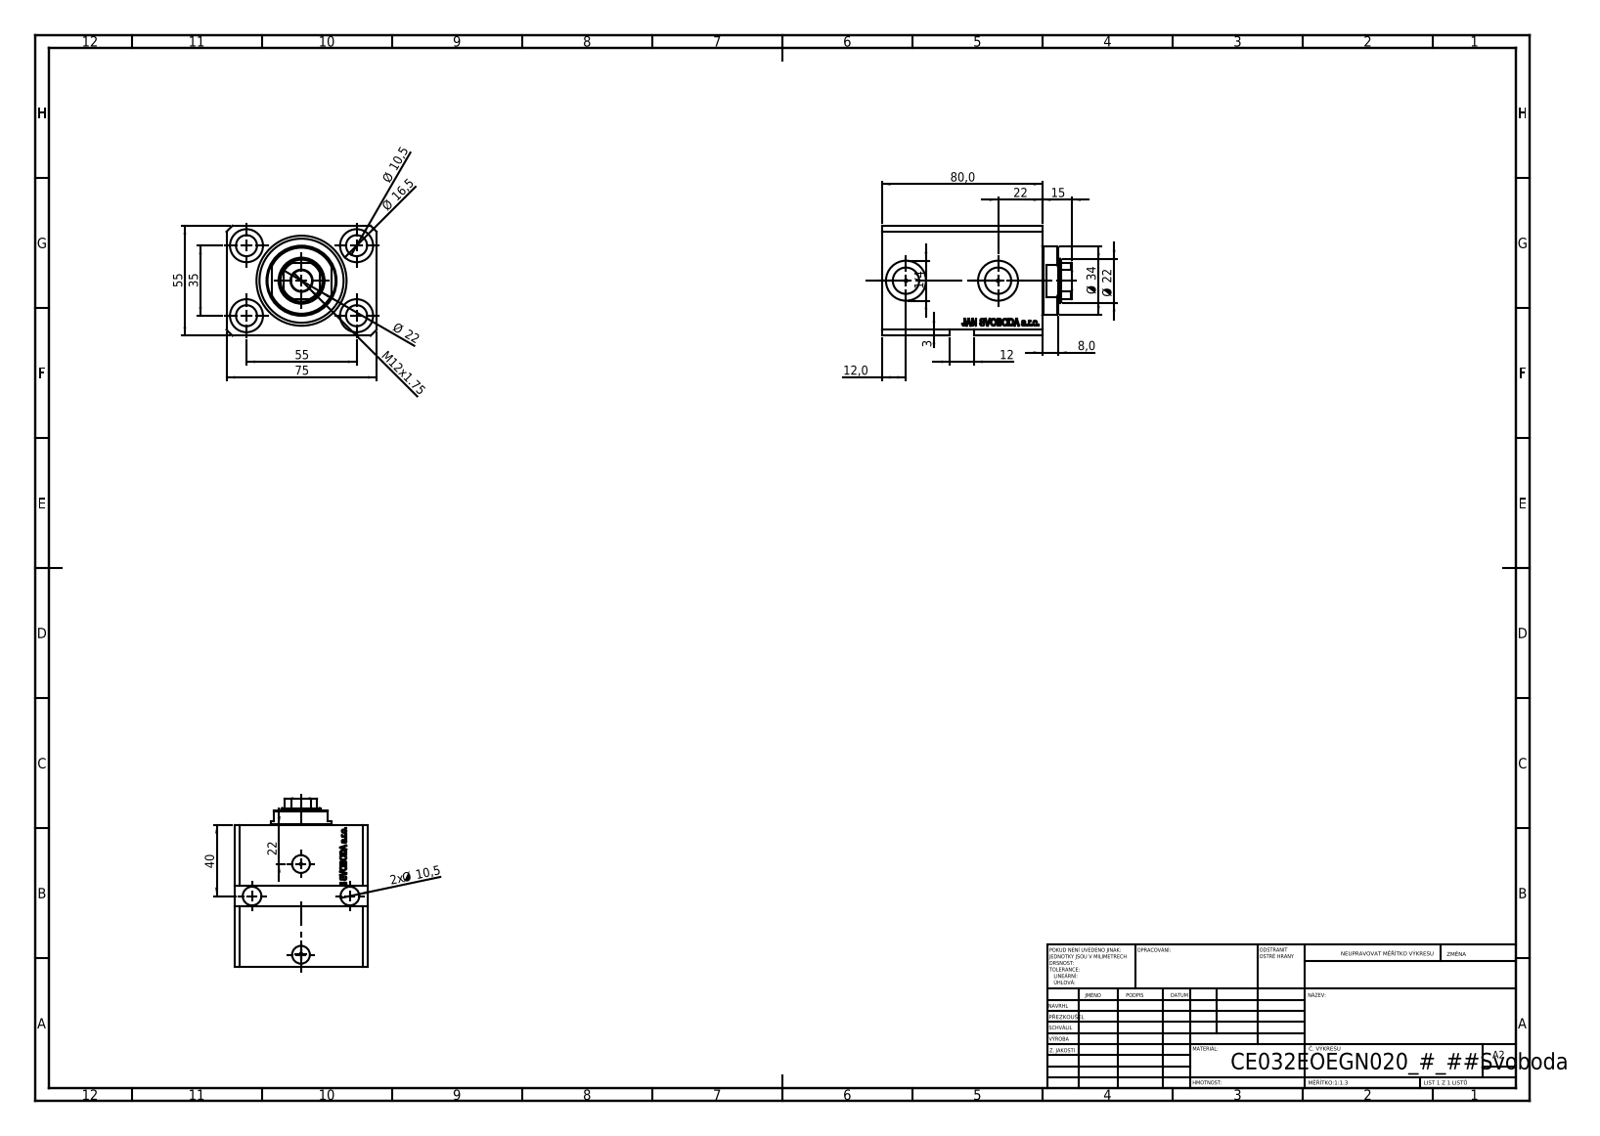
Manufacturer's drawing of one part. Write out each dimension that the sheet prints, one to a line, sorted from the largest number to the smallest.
80,0
75
55
55
40
35
Ø 34
Ø 22
22
Ø 22
22
Ø 16,5
15
M12x1.75
12,0
12
Ø 10,5
2x Ø 10,5
8,0
3
1/4
